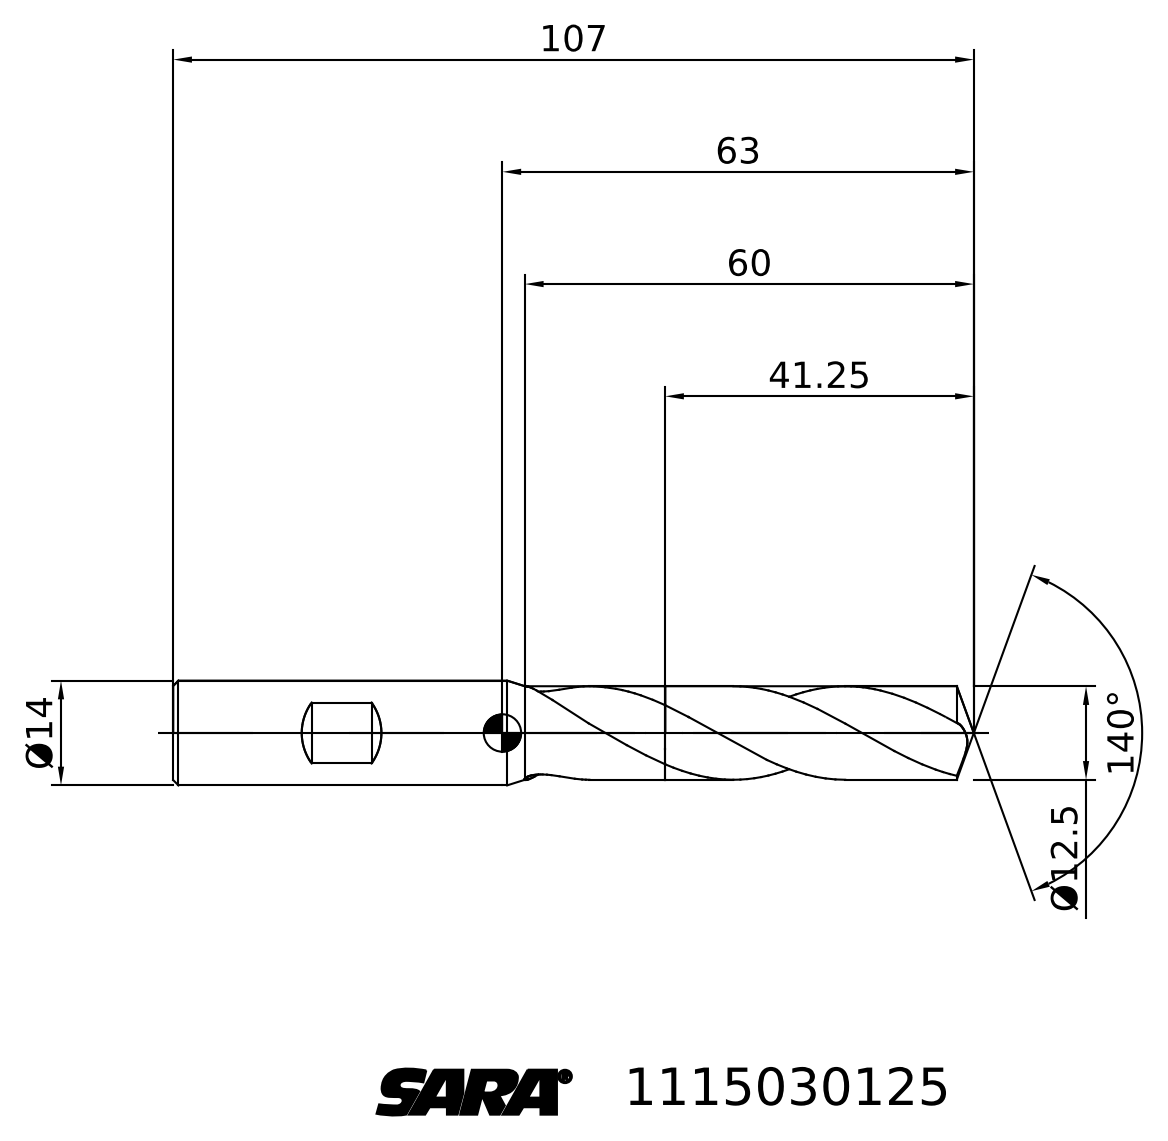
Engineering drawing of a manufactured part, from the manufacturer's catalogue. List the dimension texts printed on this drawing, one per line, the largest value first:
140°
107
63
60
41.25
Ø14
Ø12.5
